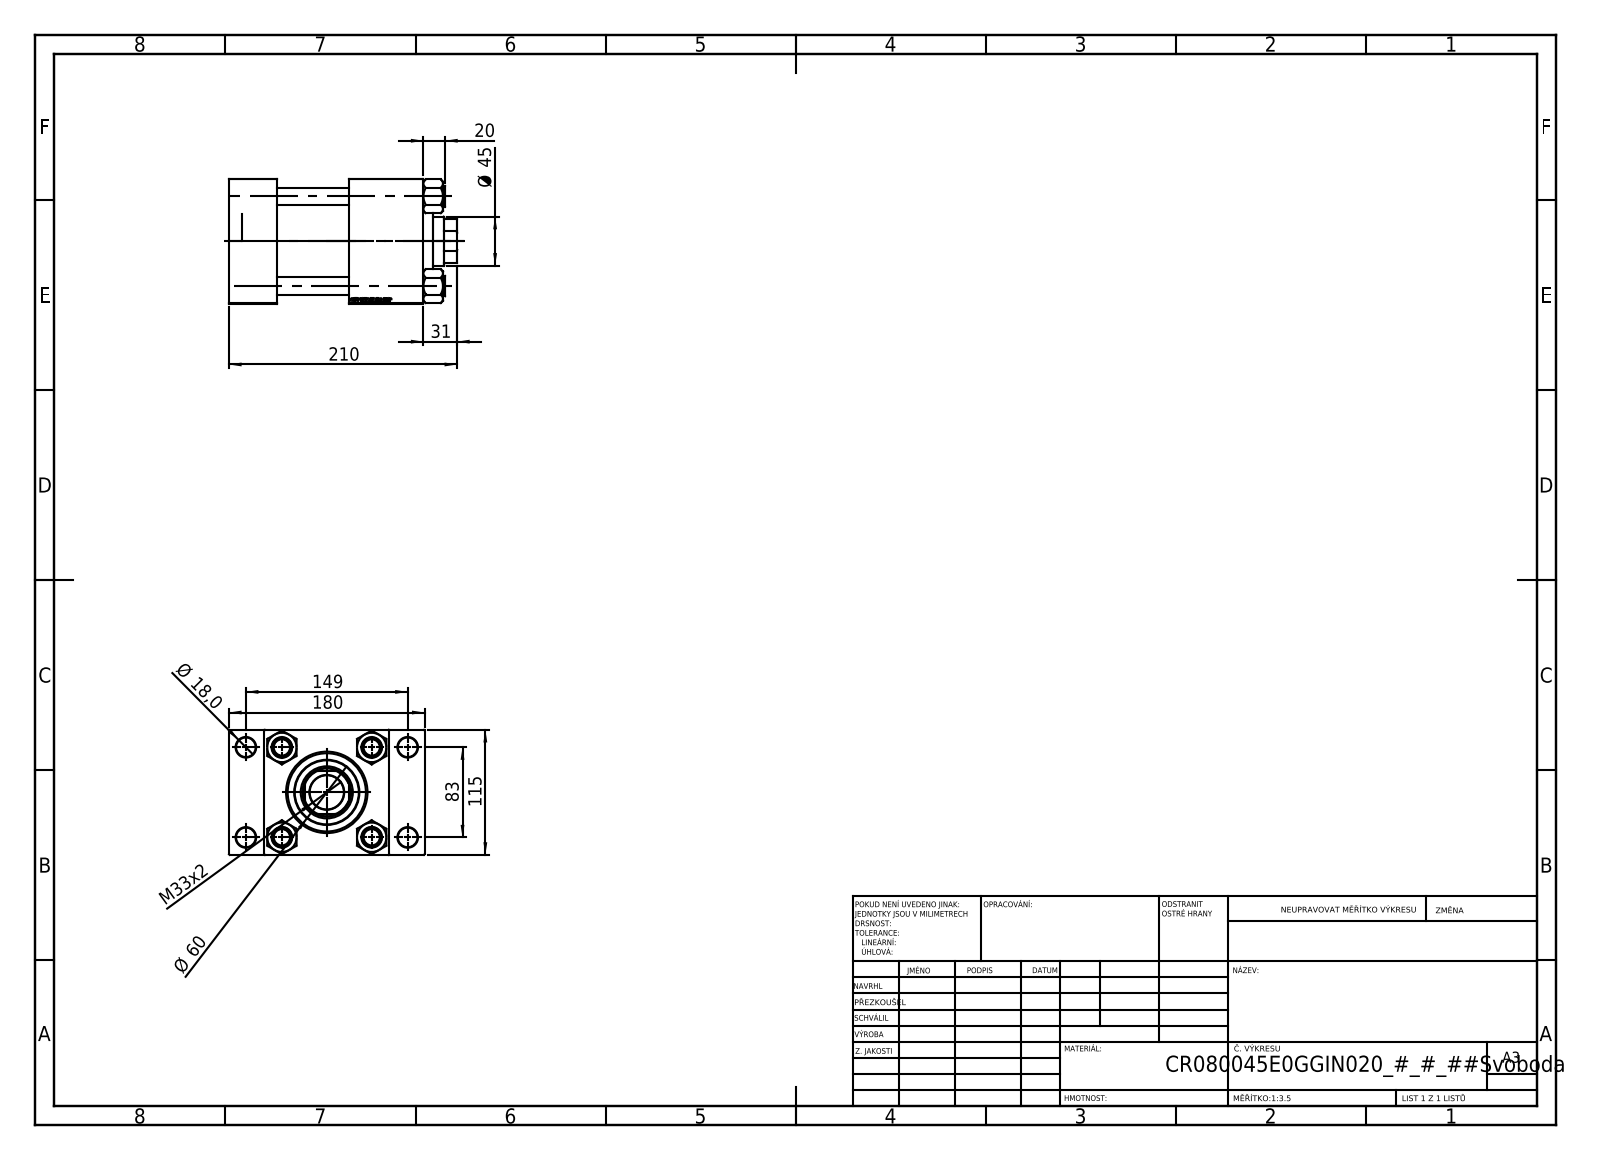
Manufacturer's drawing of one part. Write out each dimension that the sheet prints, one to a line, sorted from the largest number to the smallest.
210
180
149
115
83
Ø 60
Ø 45
M33x2
31
20
Ø 18,0
